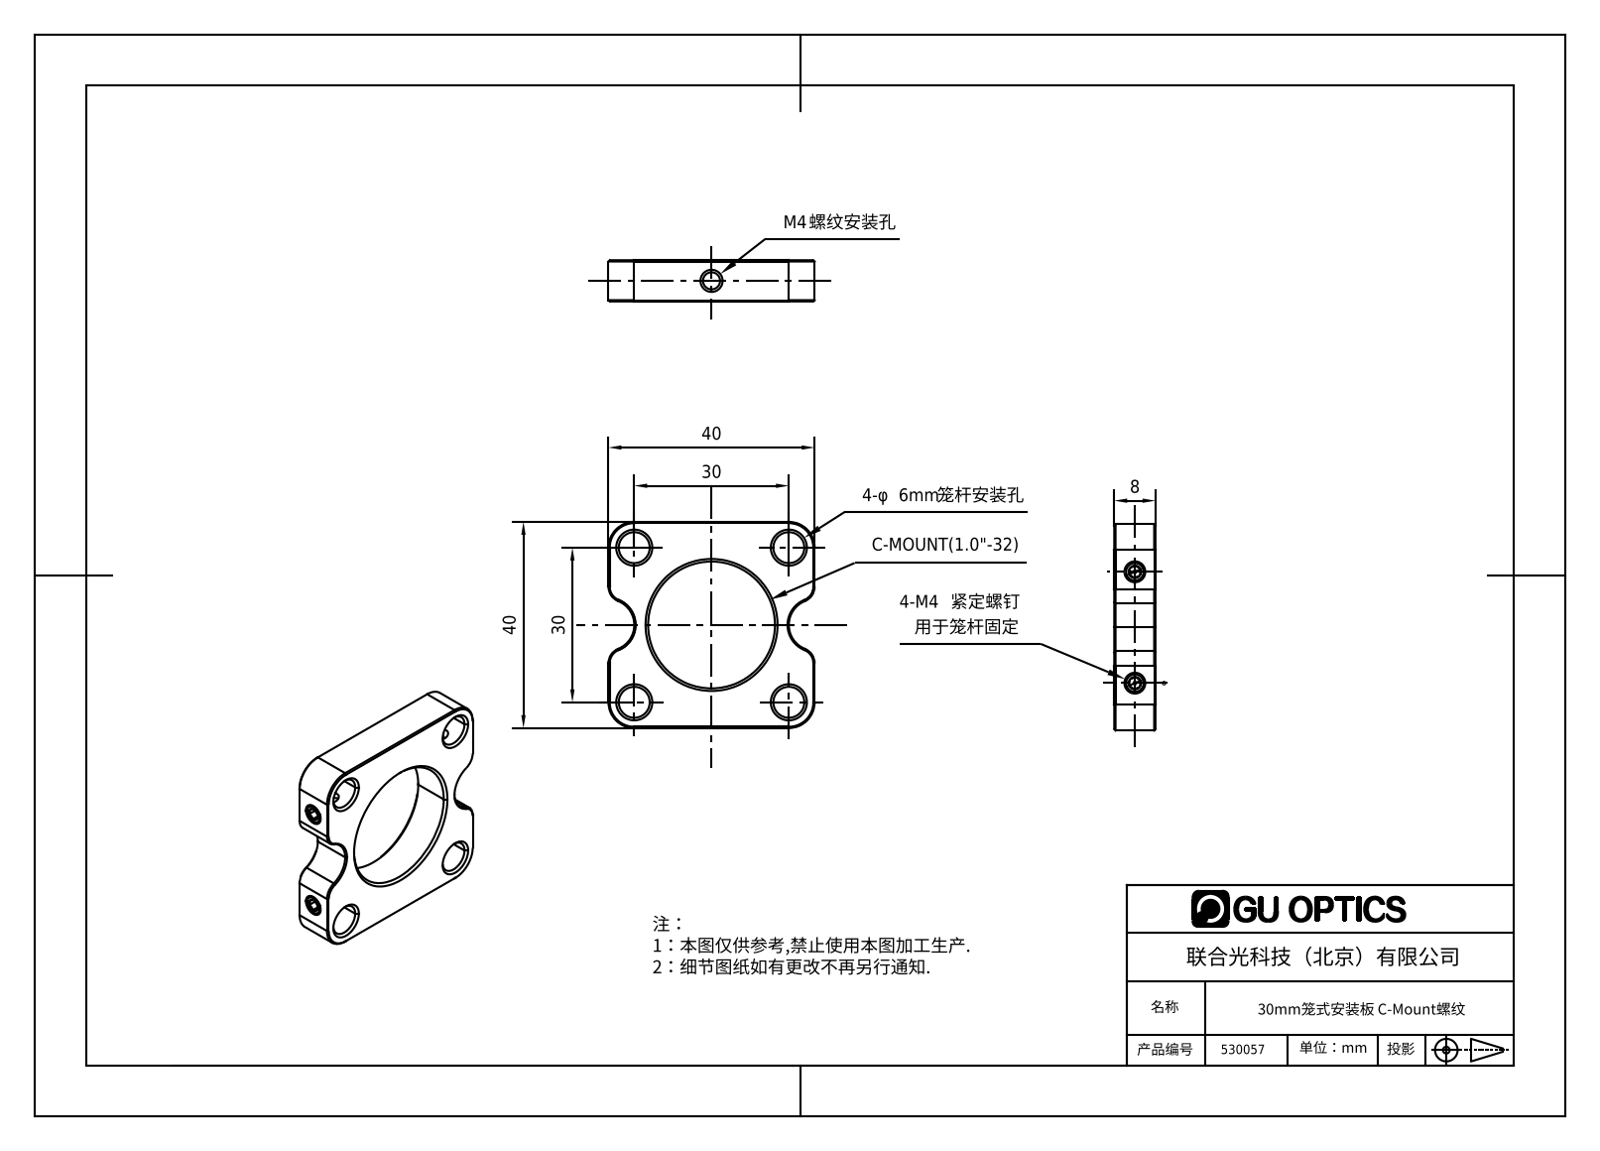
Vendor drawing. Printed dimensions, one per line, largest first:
40
40
30
30
8
